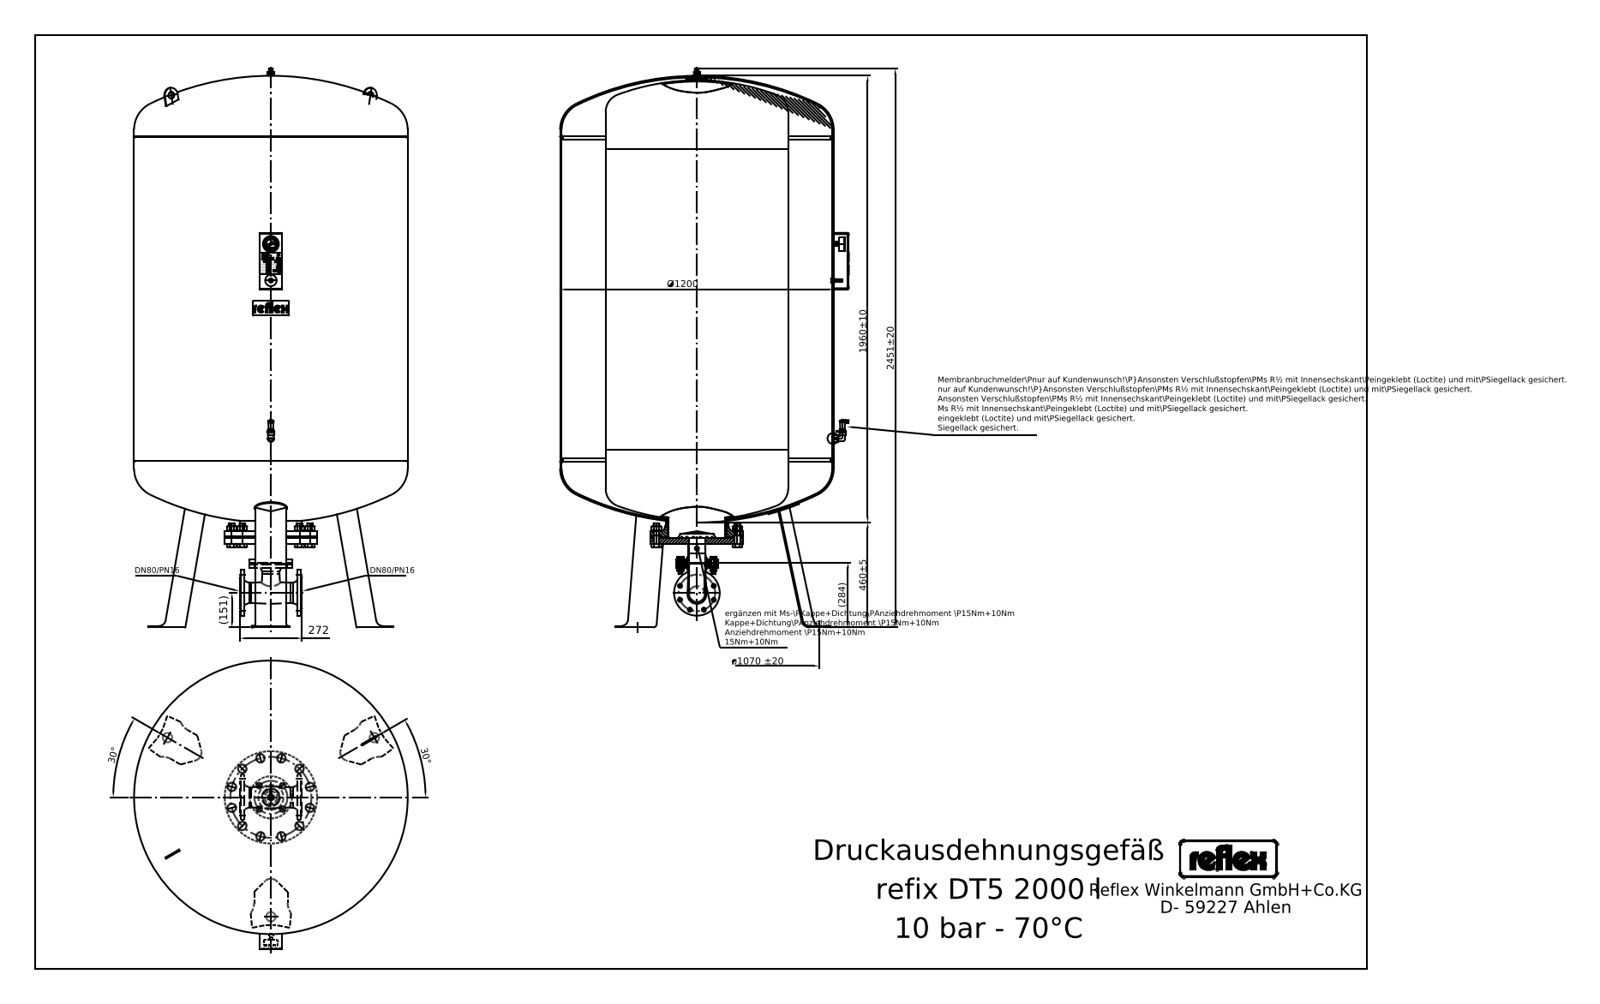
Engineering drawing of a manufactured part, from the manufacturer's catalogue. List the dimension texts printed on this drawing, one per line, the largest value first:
2451±20
1960±10
Ø1200
ø1070 ±20
460±5
(284)
272
(151)
30°
30°
